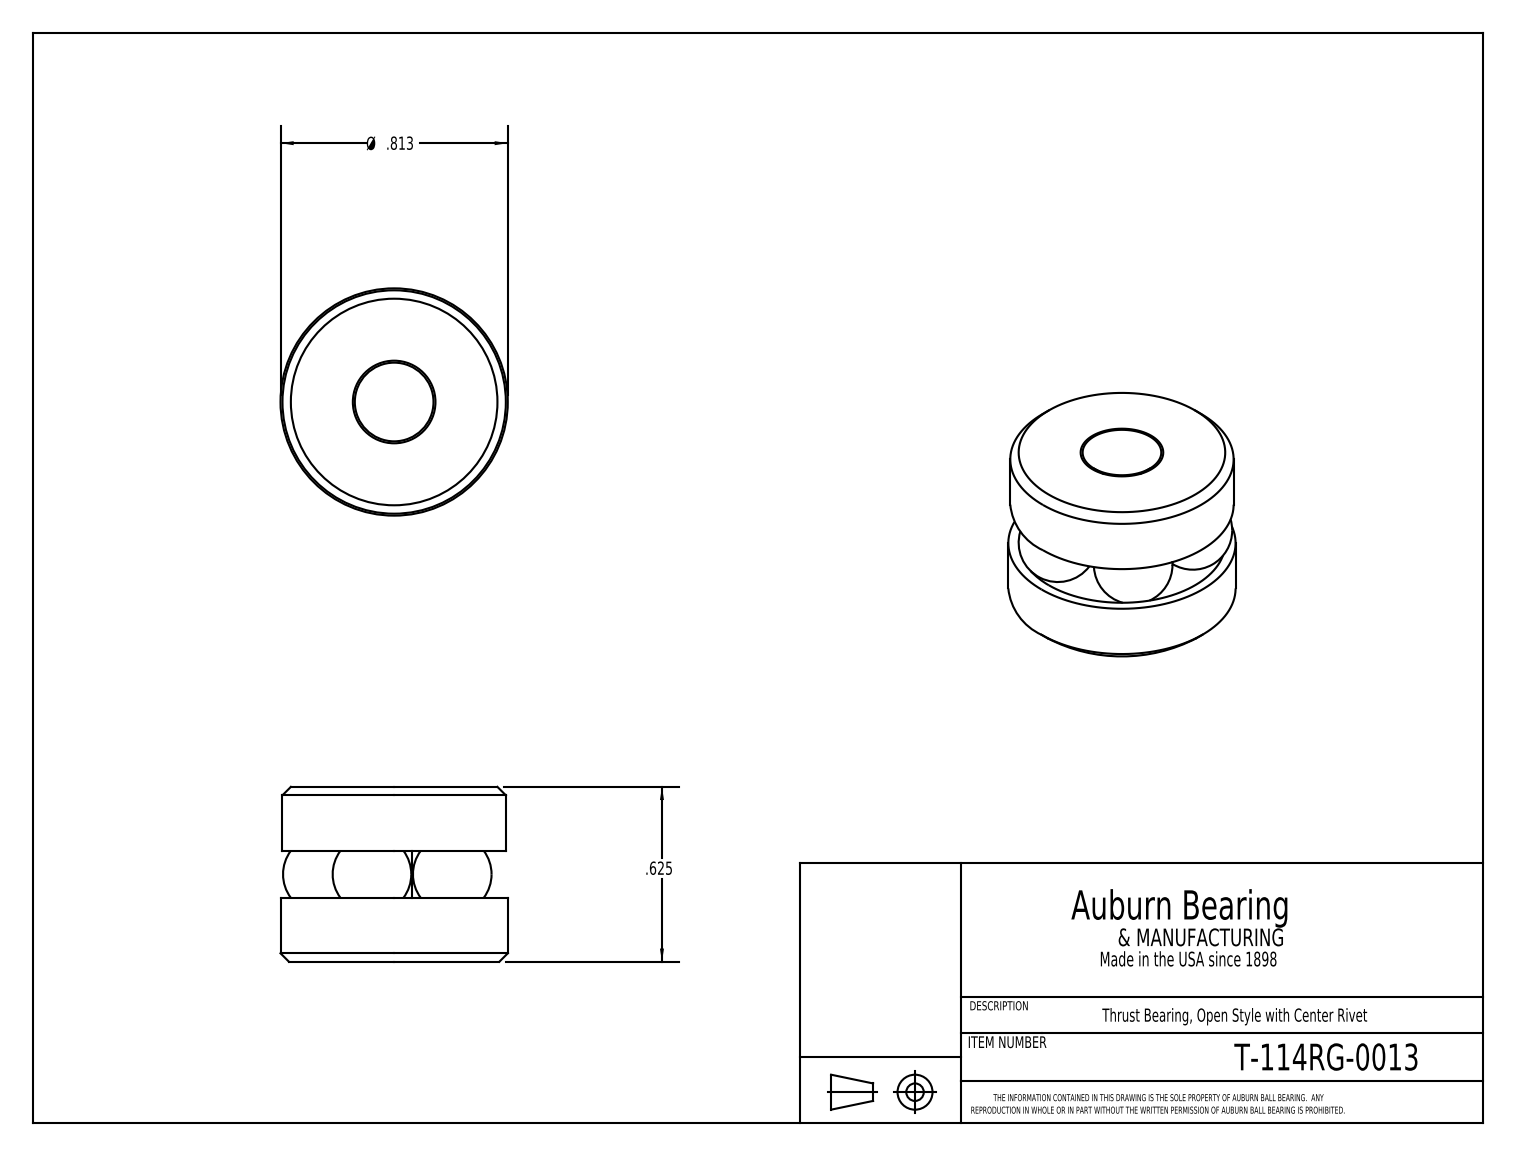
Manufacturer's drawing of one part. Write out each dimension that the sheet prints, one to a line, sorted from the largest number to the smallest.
Ø .813
.625
